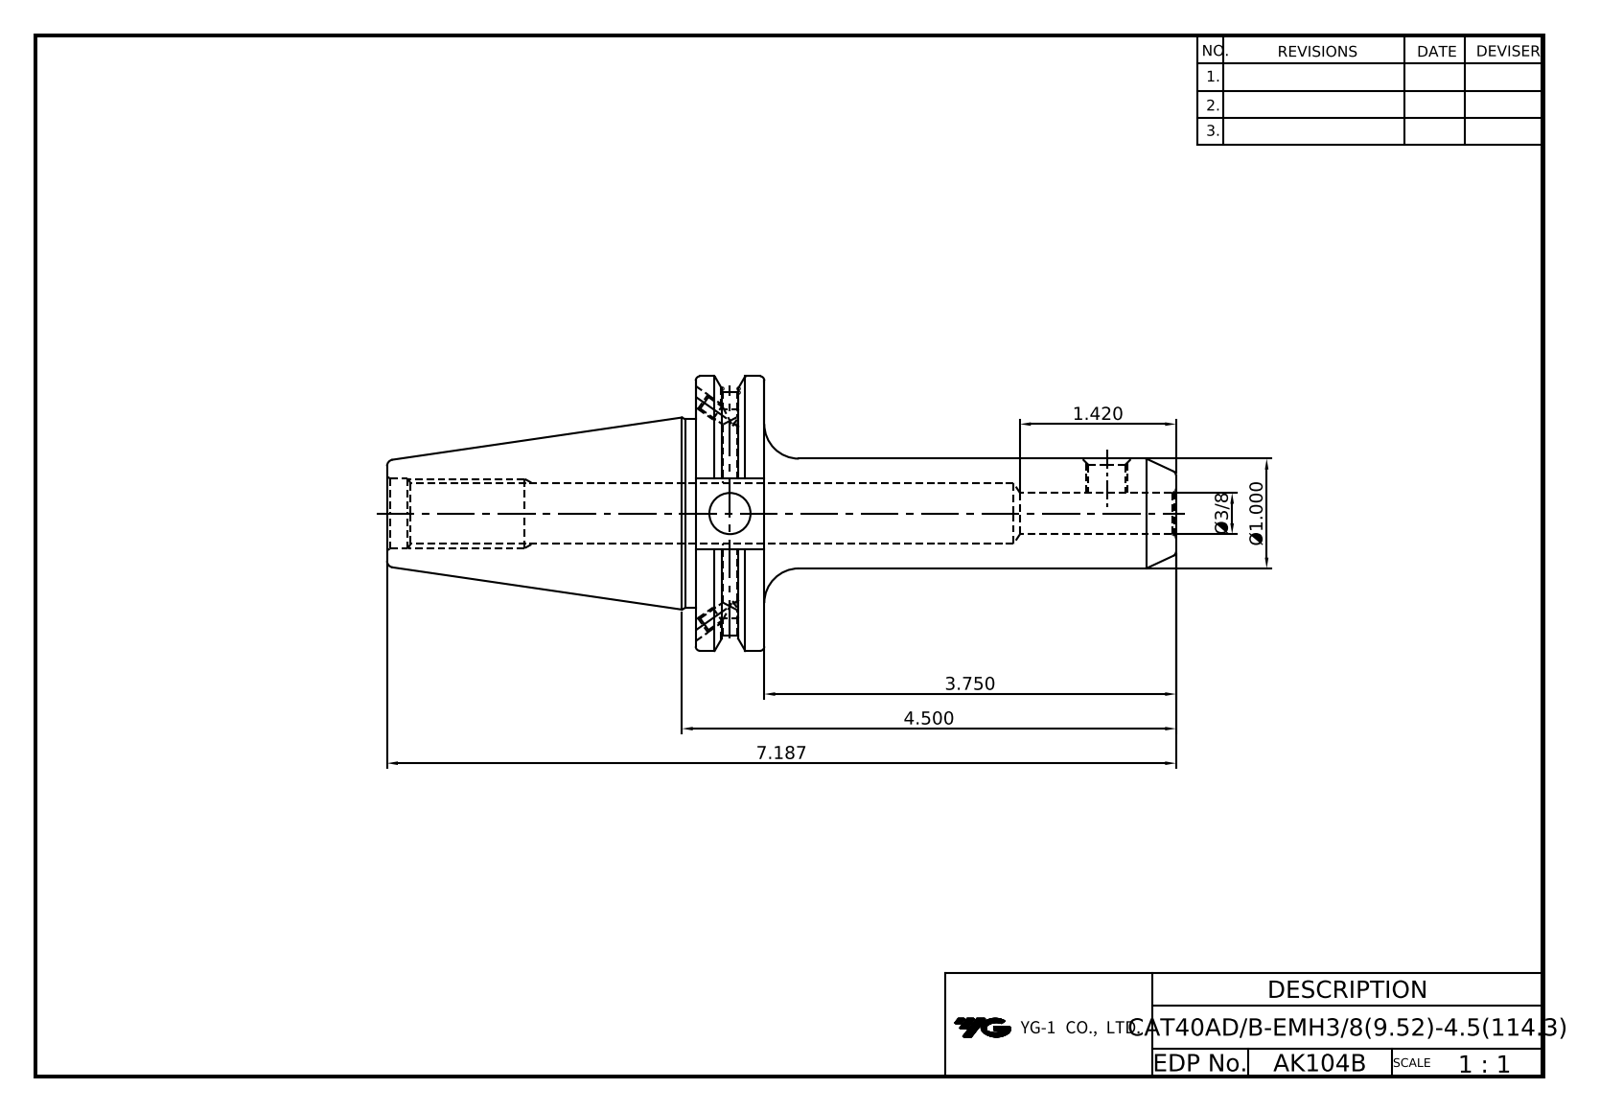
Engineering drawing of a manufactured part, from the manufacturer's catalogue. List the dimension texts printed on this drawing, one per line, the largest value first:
7.187
4.500
3.750
1.420
Ø1.000
Ø3/8
